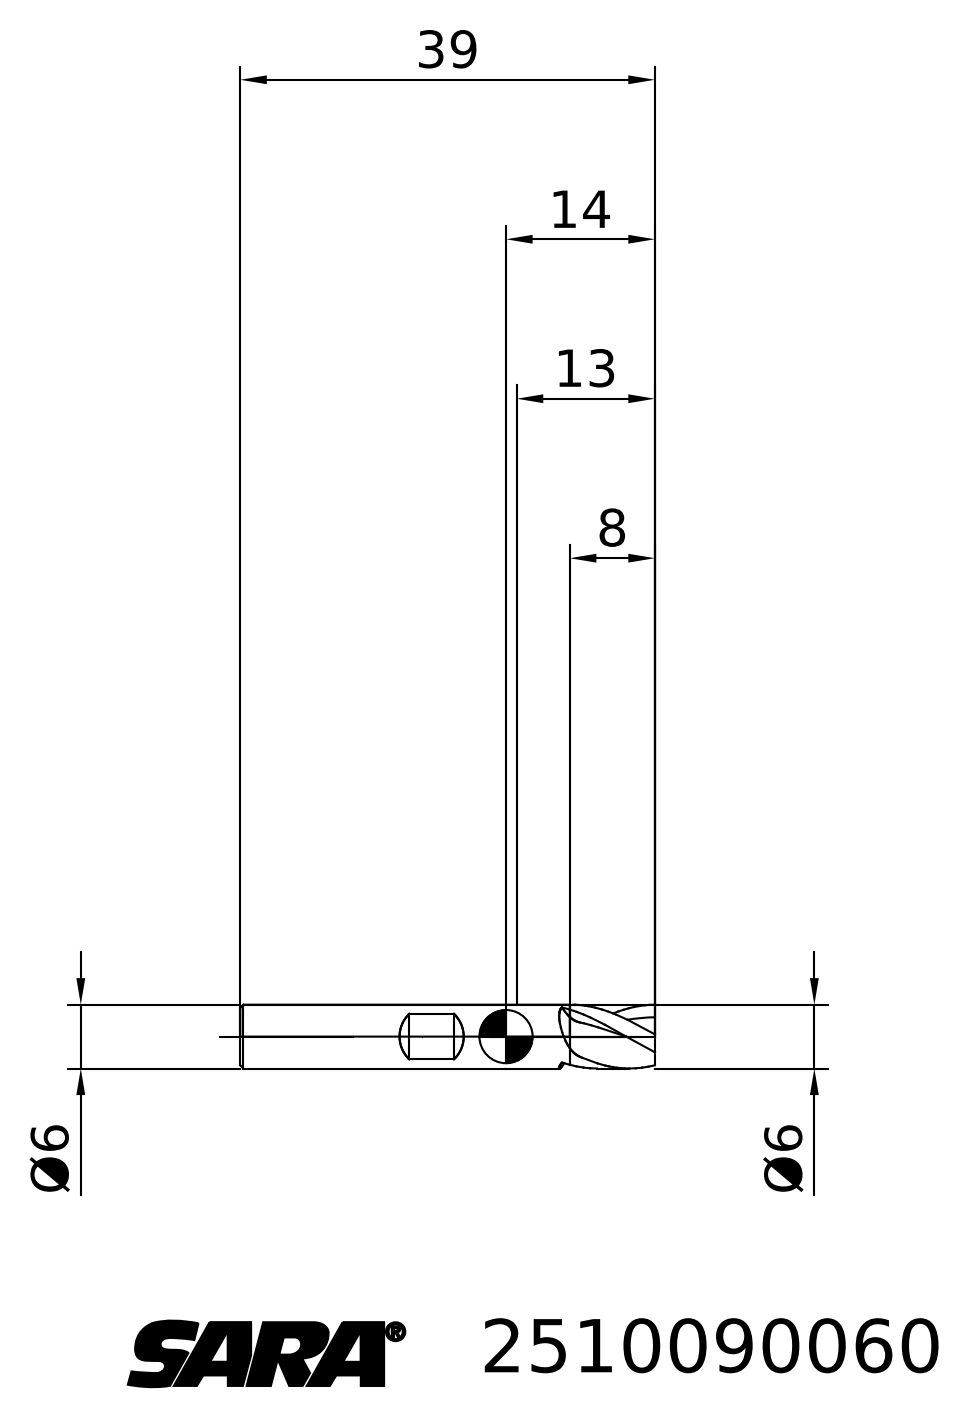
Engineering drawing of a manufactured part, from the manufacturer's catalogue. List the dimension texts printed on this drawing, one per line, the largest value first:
39
14
13
8
Ø6
Ø6
